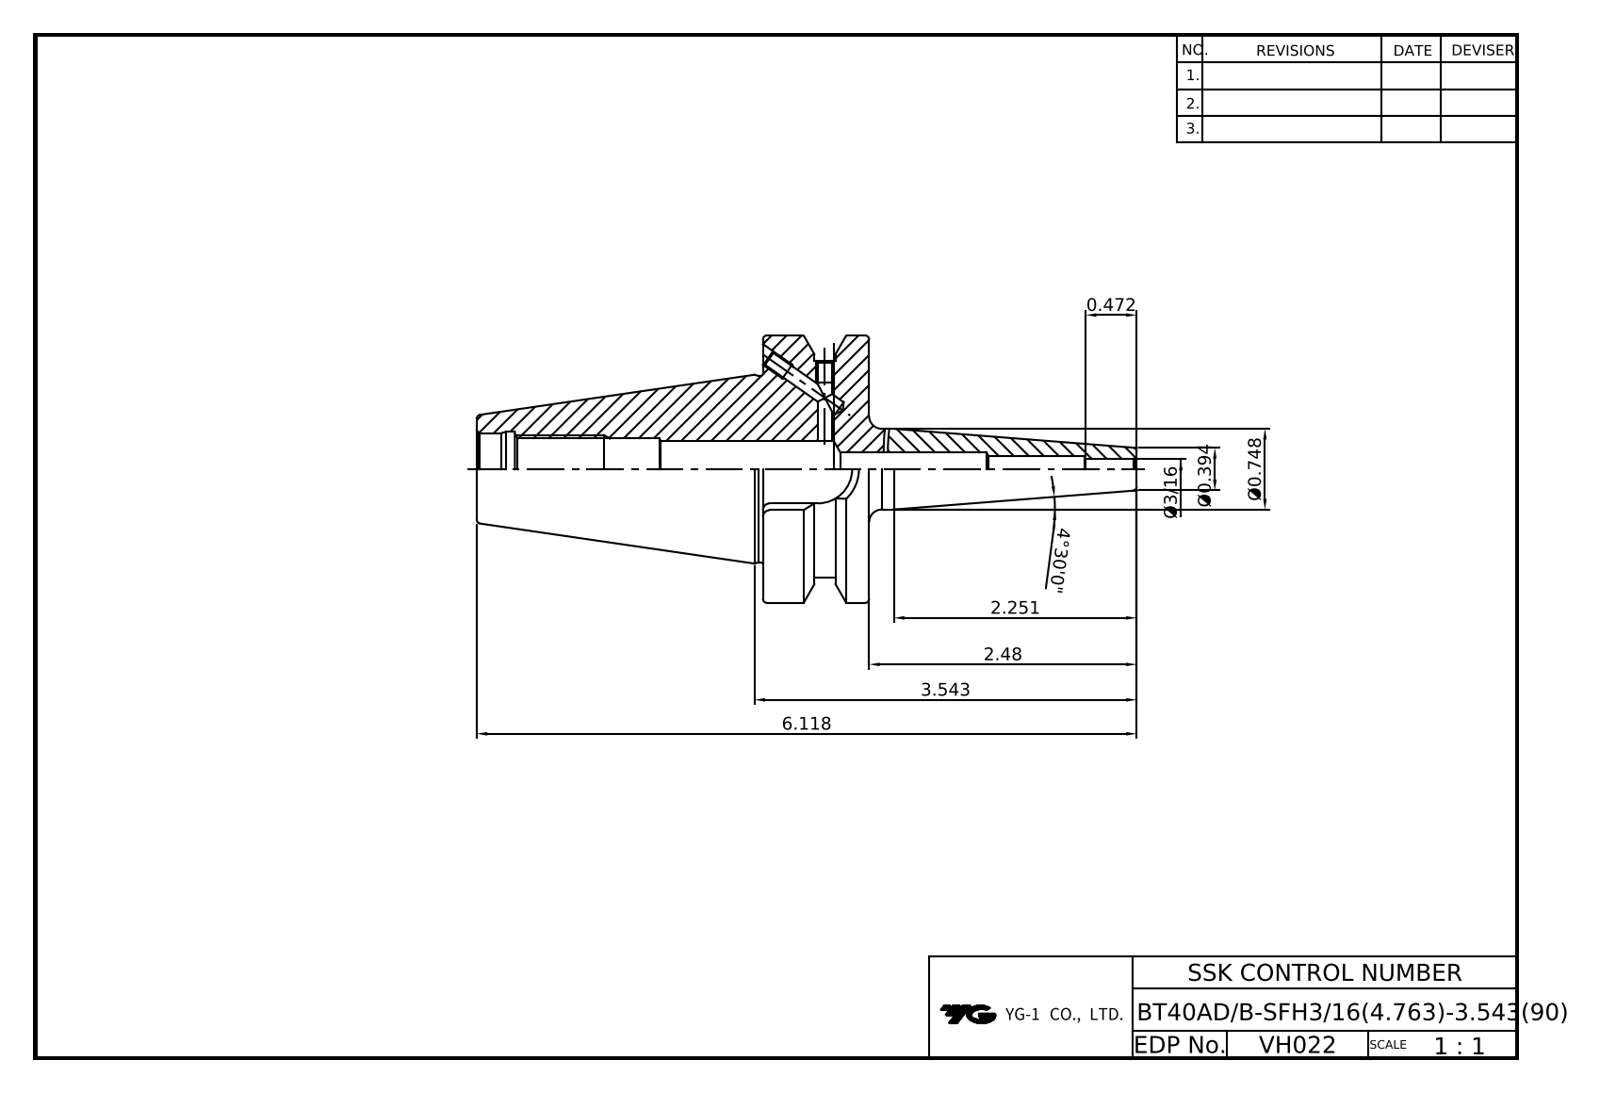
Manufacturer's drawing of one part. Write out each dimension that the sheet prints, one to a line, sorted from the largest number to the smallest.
6.118
4°30'0"
3.543
2.48
2.251
Ø0.748
0.472
Ø0.394
